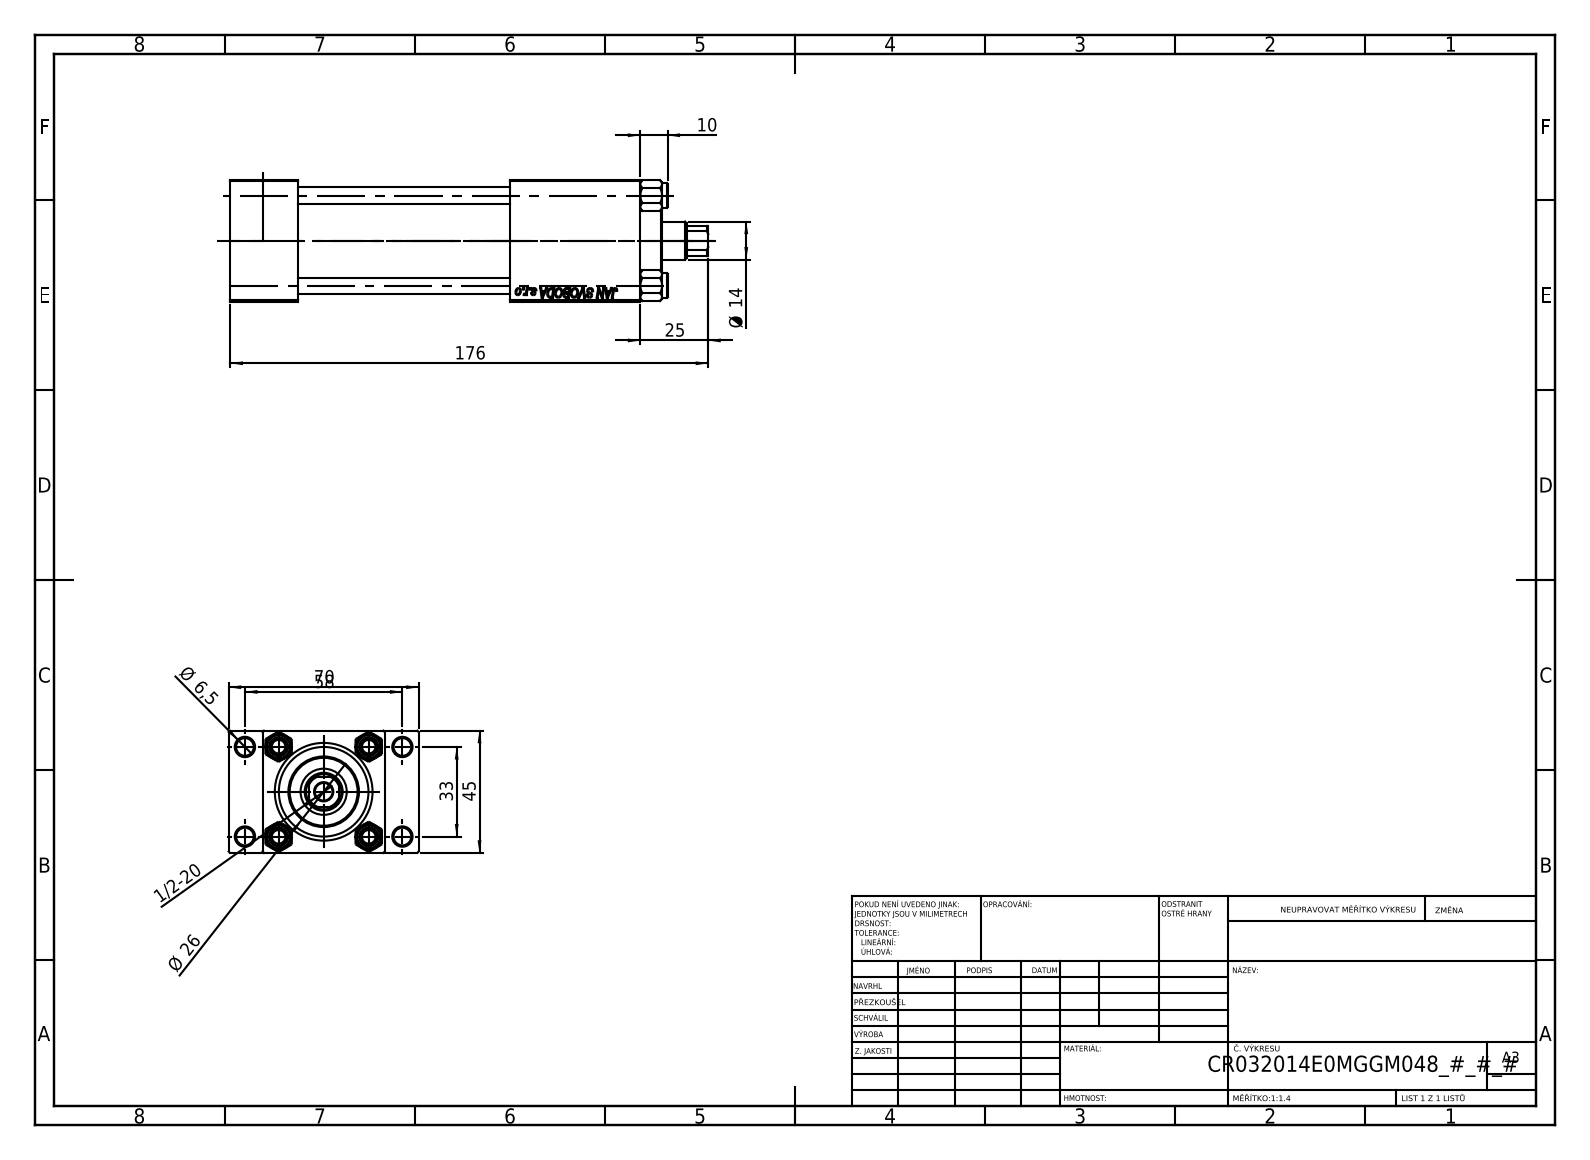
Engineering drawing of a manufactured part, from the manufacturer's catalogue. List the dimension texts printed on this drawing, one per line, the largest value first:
176
70
58
45
33
Ø 26
25
Ø 14
10
Ø 6,5
1/2-20
